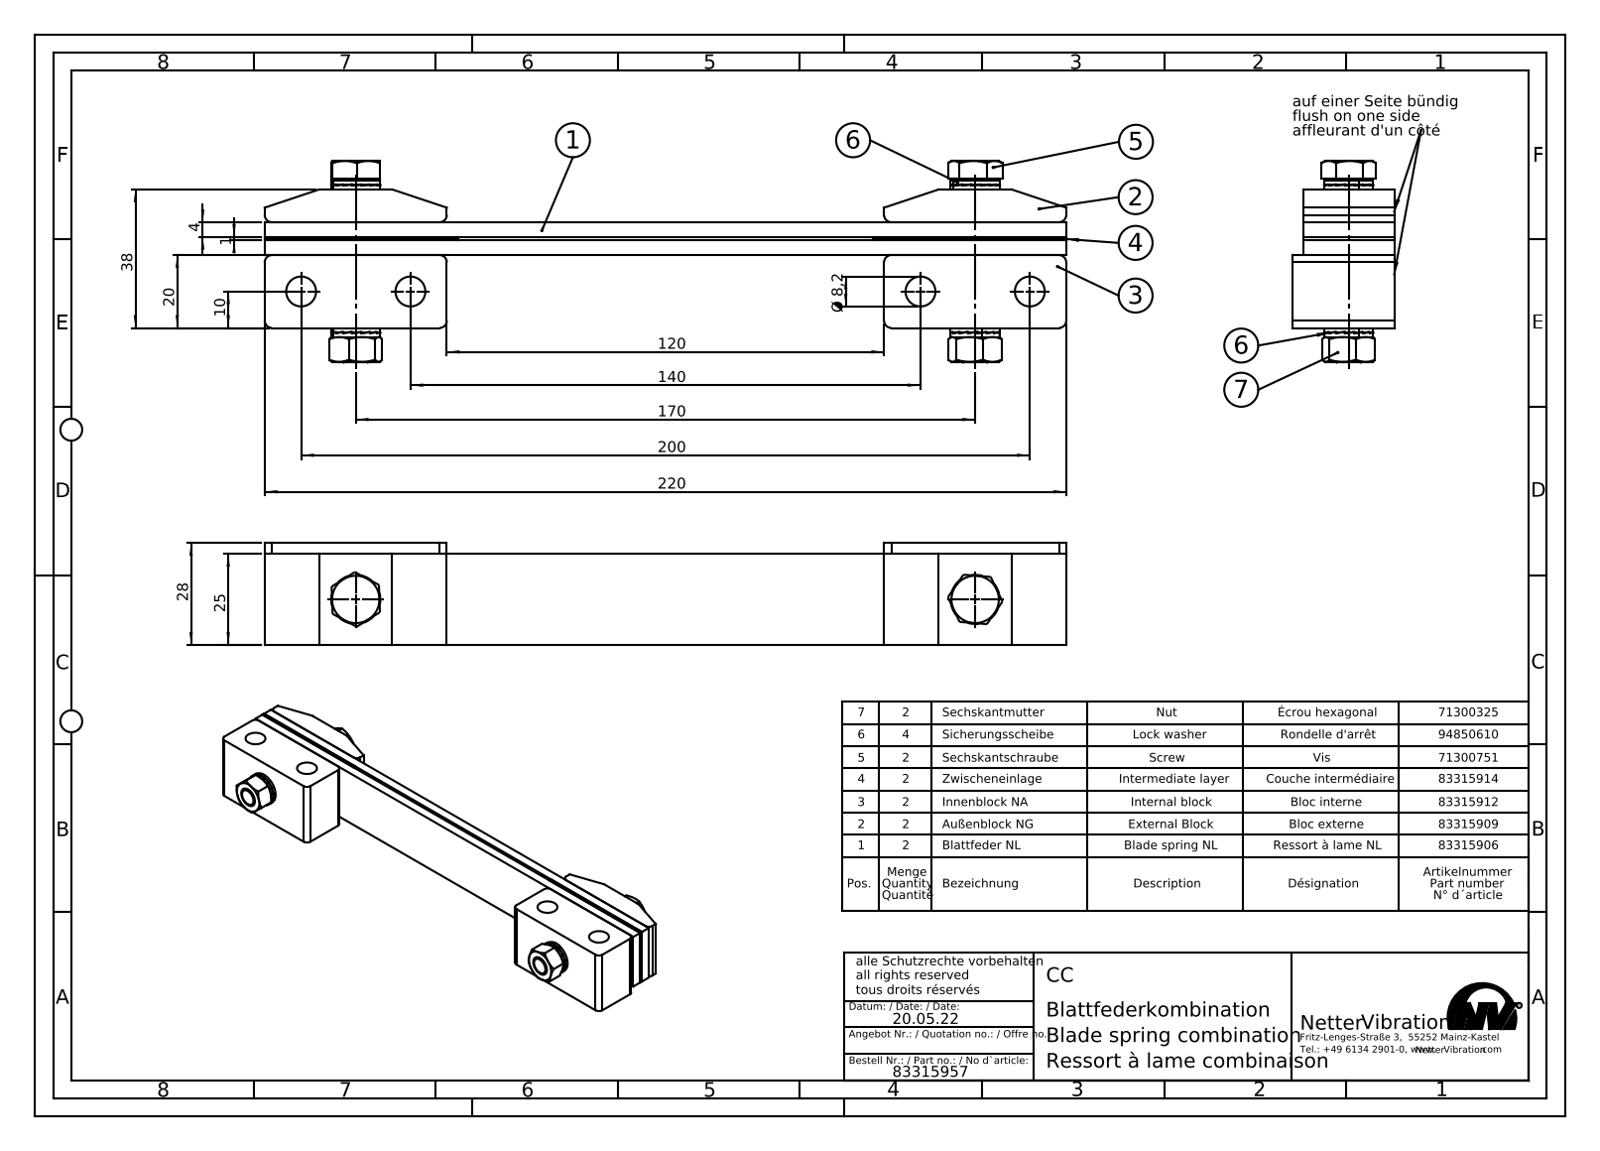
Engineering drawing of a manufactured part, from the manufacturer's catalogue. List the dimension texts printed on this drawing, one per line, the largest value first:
220
200
170
140
120
38
28
25
20
10
Ø 8,2
4
1
